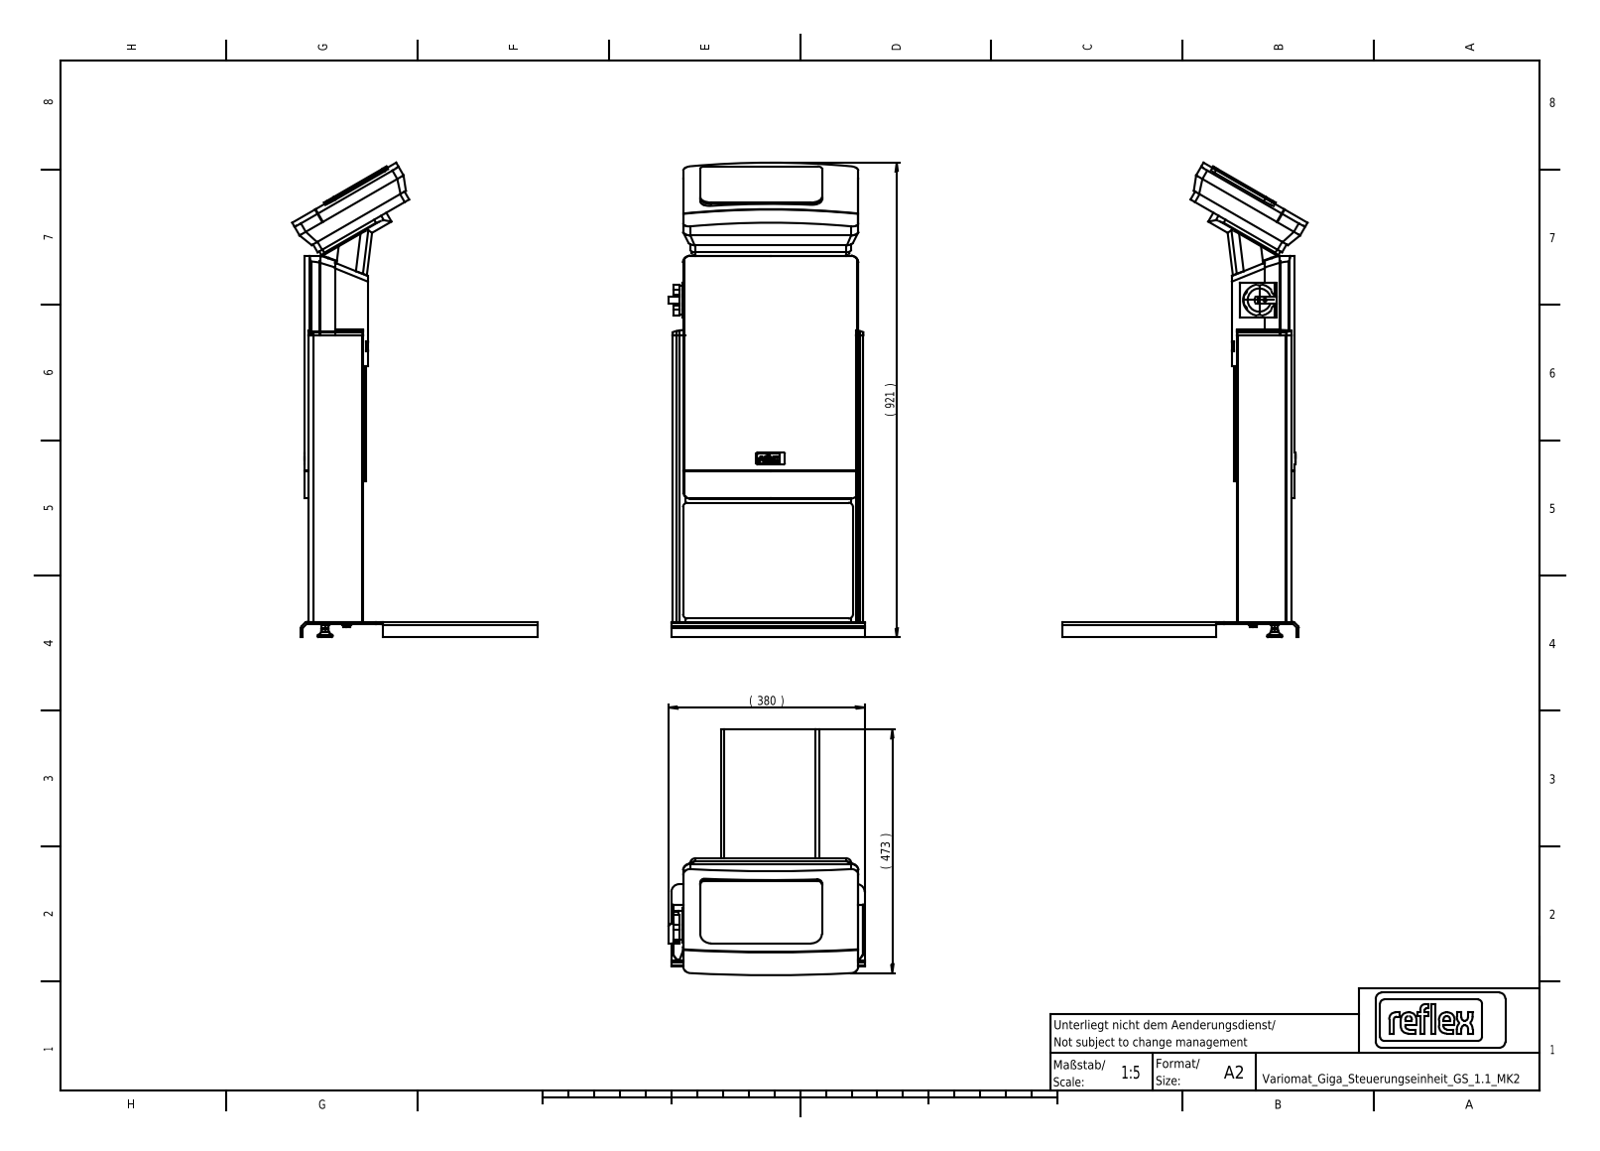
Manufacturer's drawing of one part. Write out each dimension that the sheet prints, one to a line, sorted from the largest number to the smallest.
921 ( )
473 ( )
380 ( )
